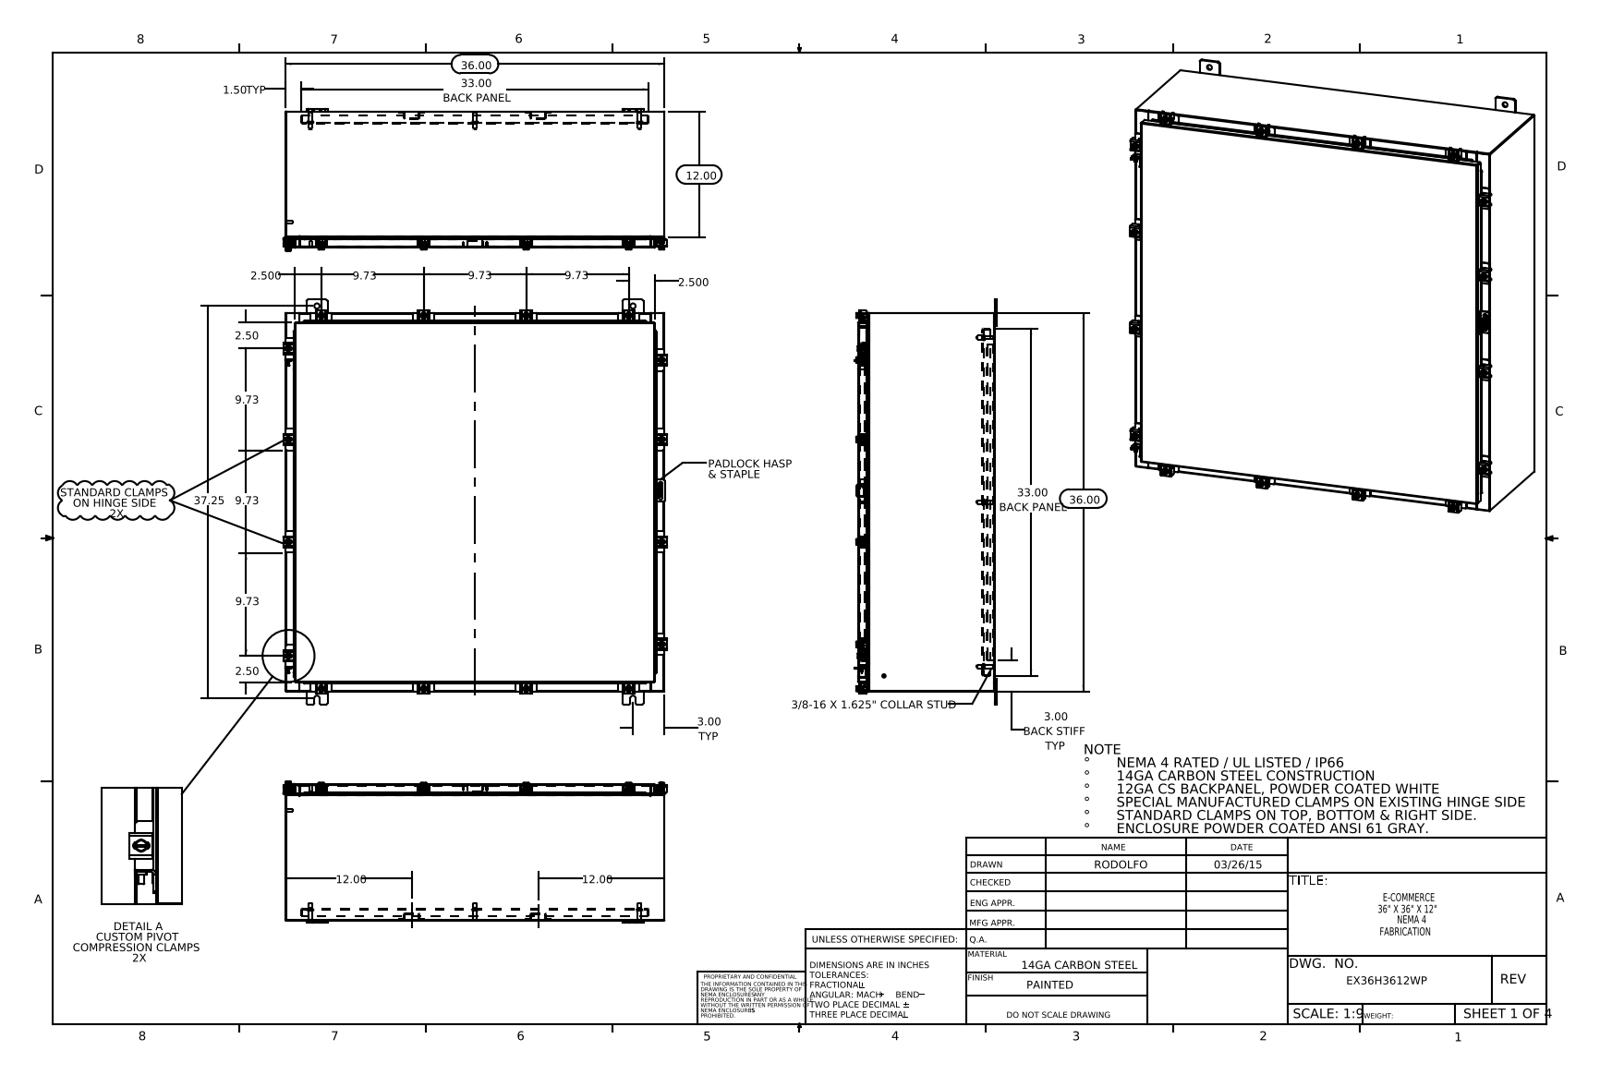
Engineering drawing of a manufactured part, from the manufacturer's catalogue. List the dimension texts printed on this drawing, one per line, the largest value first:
37.25
36.00
36.00
33.00 BACK PANEL
33.00 BACK PANEL
12.00
12.00
12.00
9.73
9.73
9.73
9.73
9.73
9.73
3.00 TYP
3.00 BACK STIFF TYP
2.500
2.500
2.50
2.50
1.50 TYP
